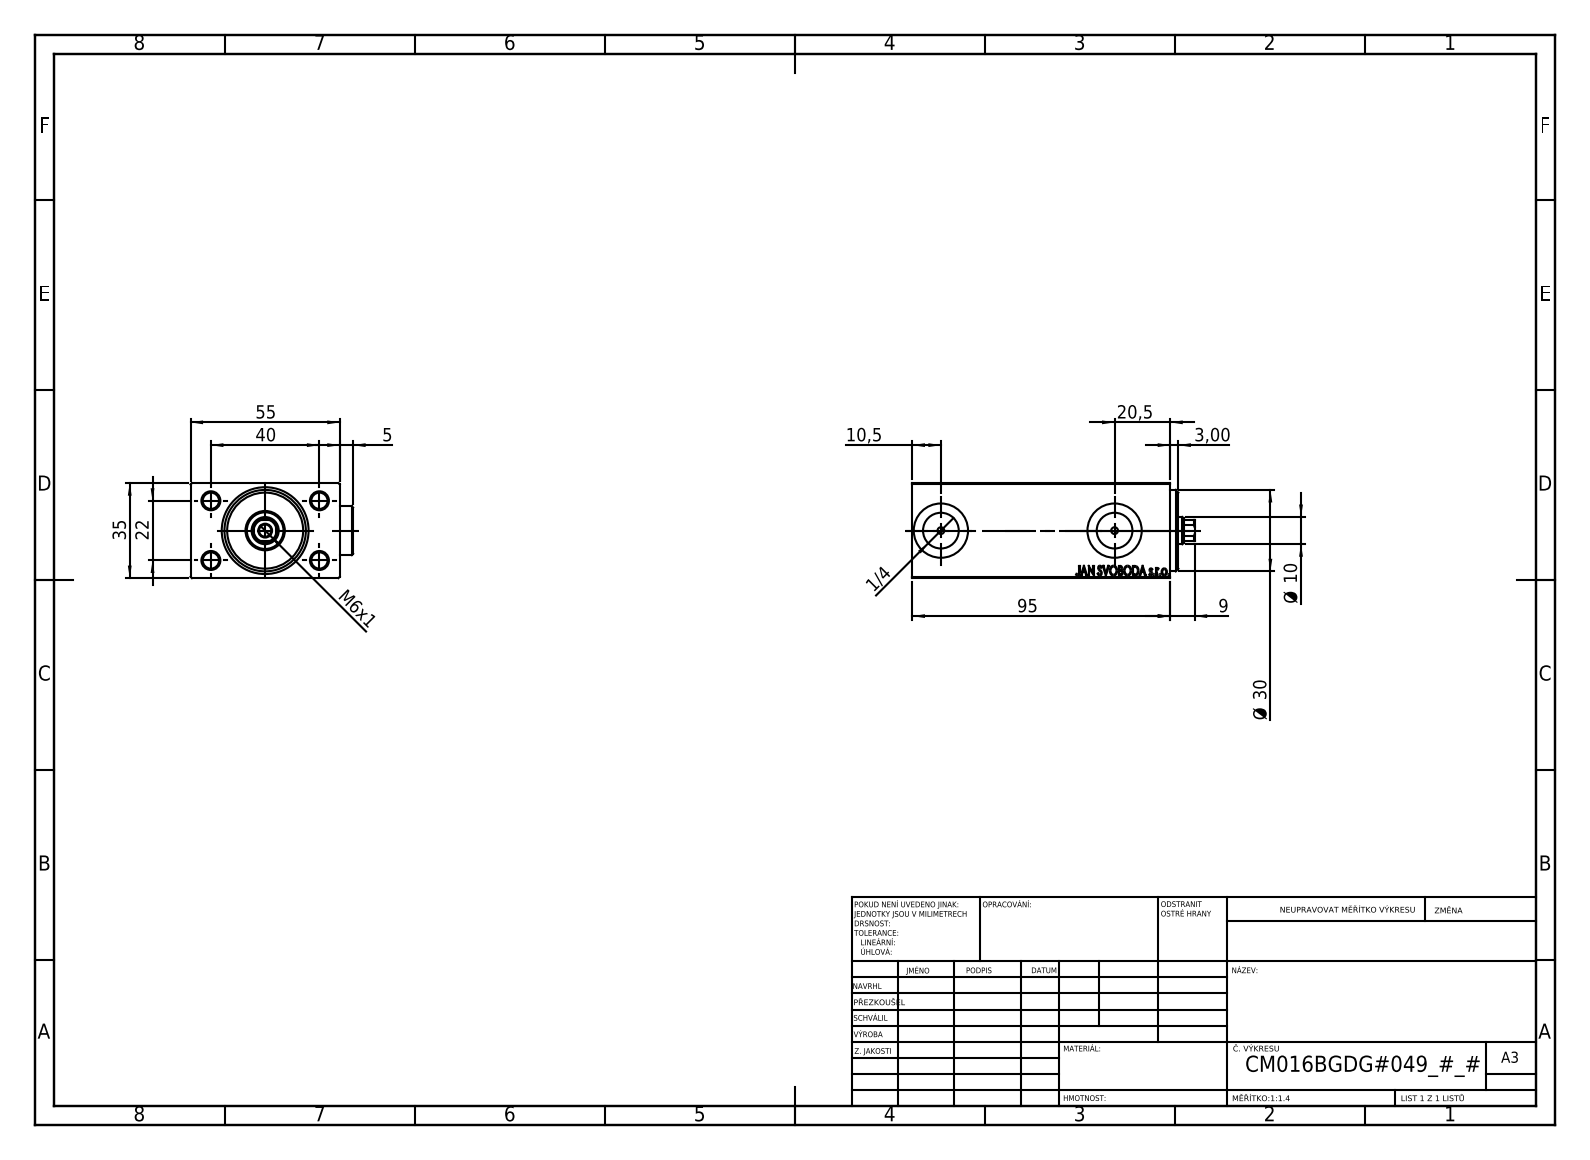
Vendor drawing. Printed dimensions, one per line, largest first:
95
55
40
35
Ø 30
22
20,5
10,5
Ø 10
9
M6x1
5
3,00
1/4
